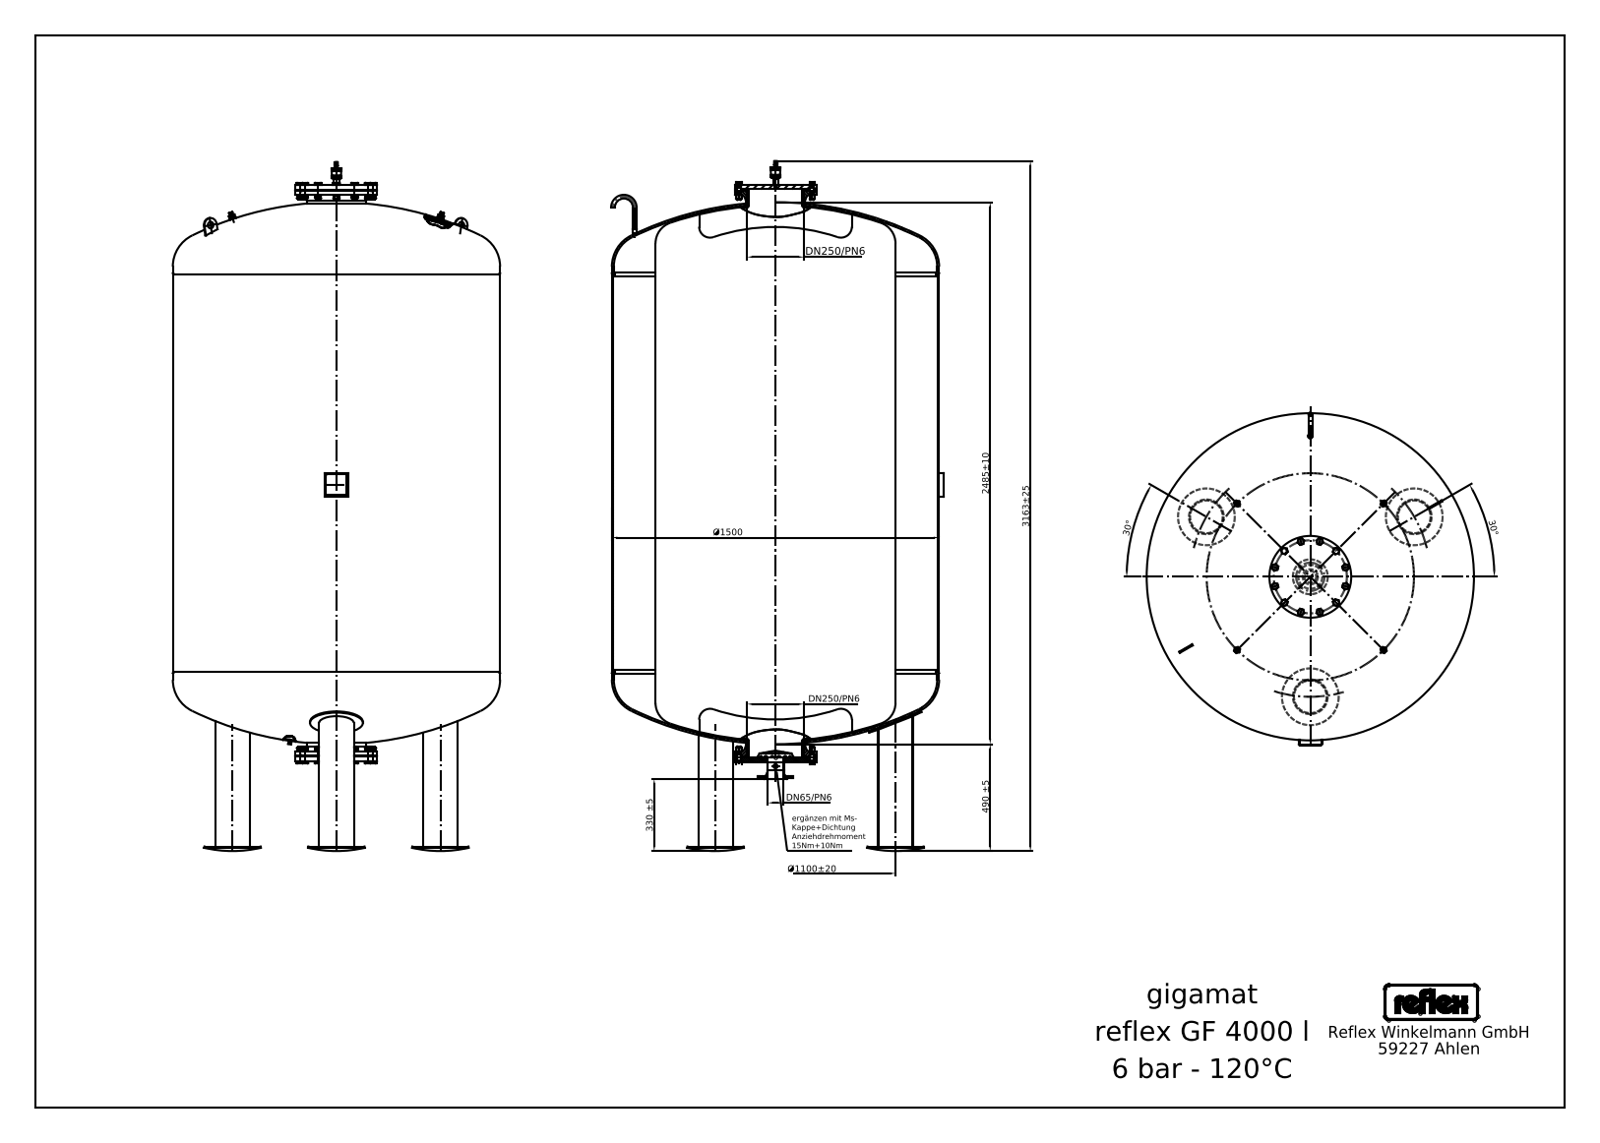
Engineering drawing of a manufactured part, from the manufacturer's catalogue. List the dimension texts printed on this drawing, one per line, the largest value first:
3163±25
2485±10
Ø1500
Ø1100±20
490 ±5
330 ±5
DN250/PN6
DN250/PN6
DN65/PN6
30°
30°
